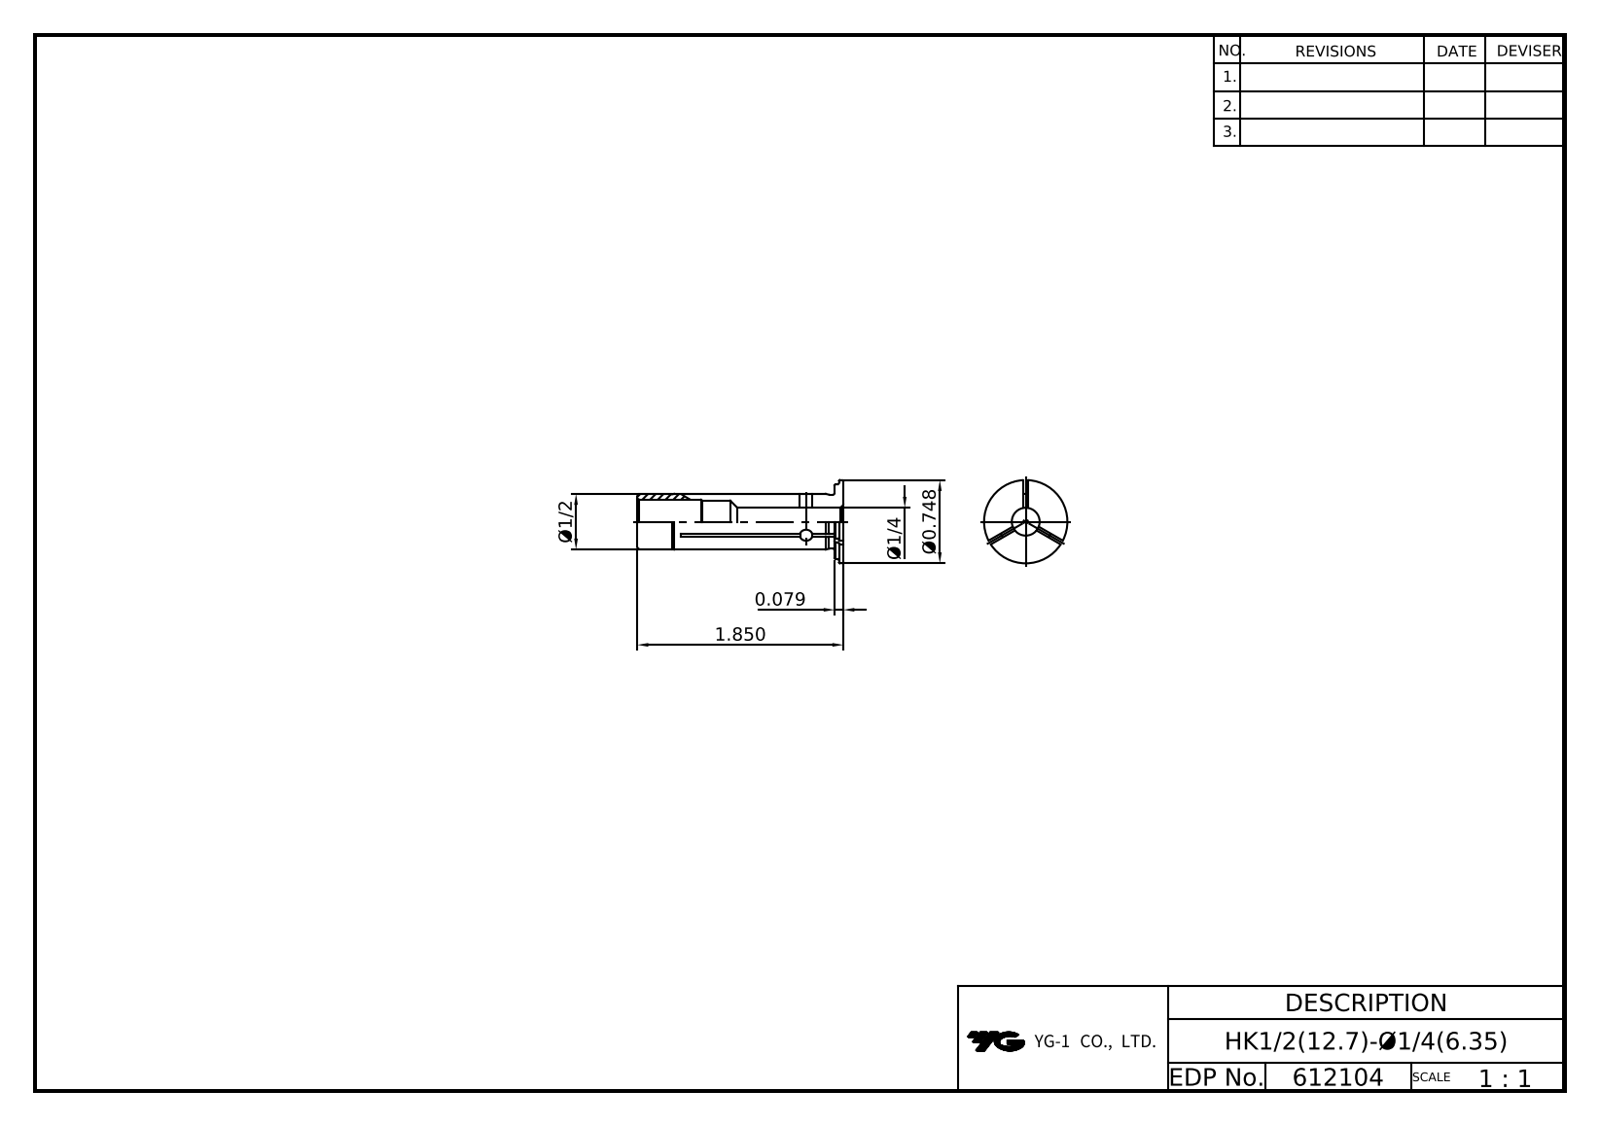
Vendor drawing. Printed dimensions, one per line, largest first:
1.850
Ø0.748
Ø1/2
0.079
